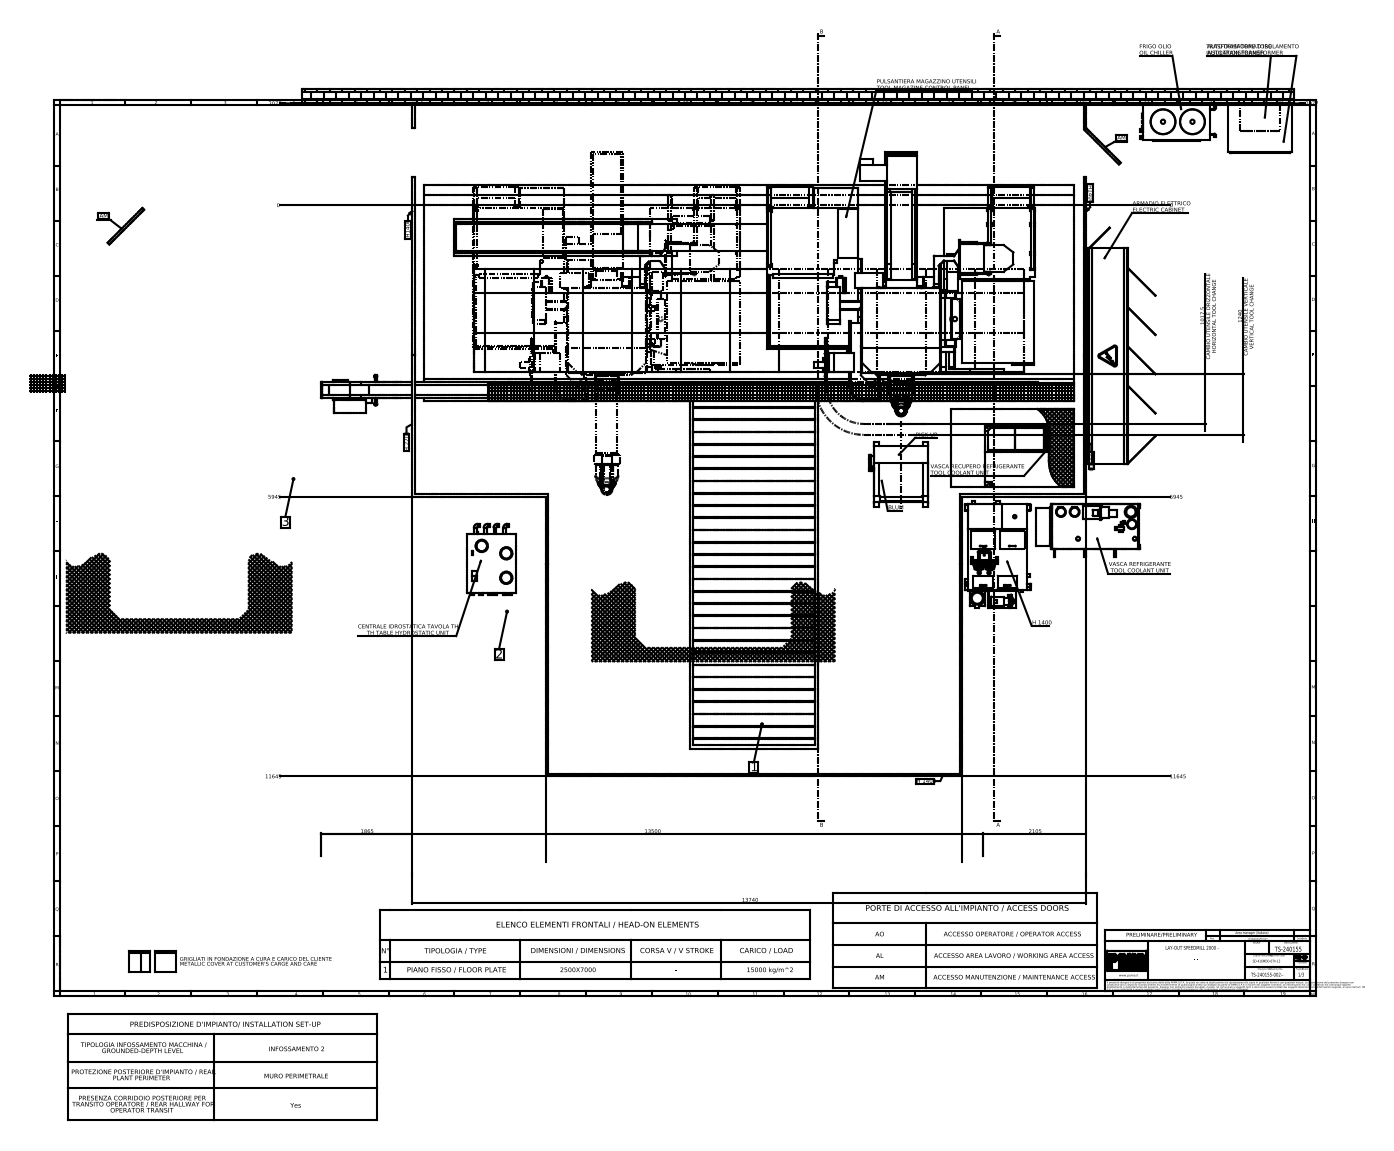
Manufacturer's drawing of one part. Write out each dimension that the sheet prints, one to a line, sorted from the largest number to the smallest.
13740
13500
11645
11645
5945
5945
2105
2077
2077
1865
1240 CAMBIO UTENSILE VERTICALE VERTICAL TOOL CHANGE
1017,5 CAMBIO UTENSILE ORIZZONTALE HORIZONTAL TOOL CHANGE
0
0
